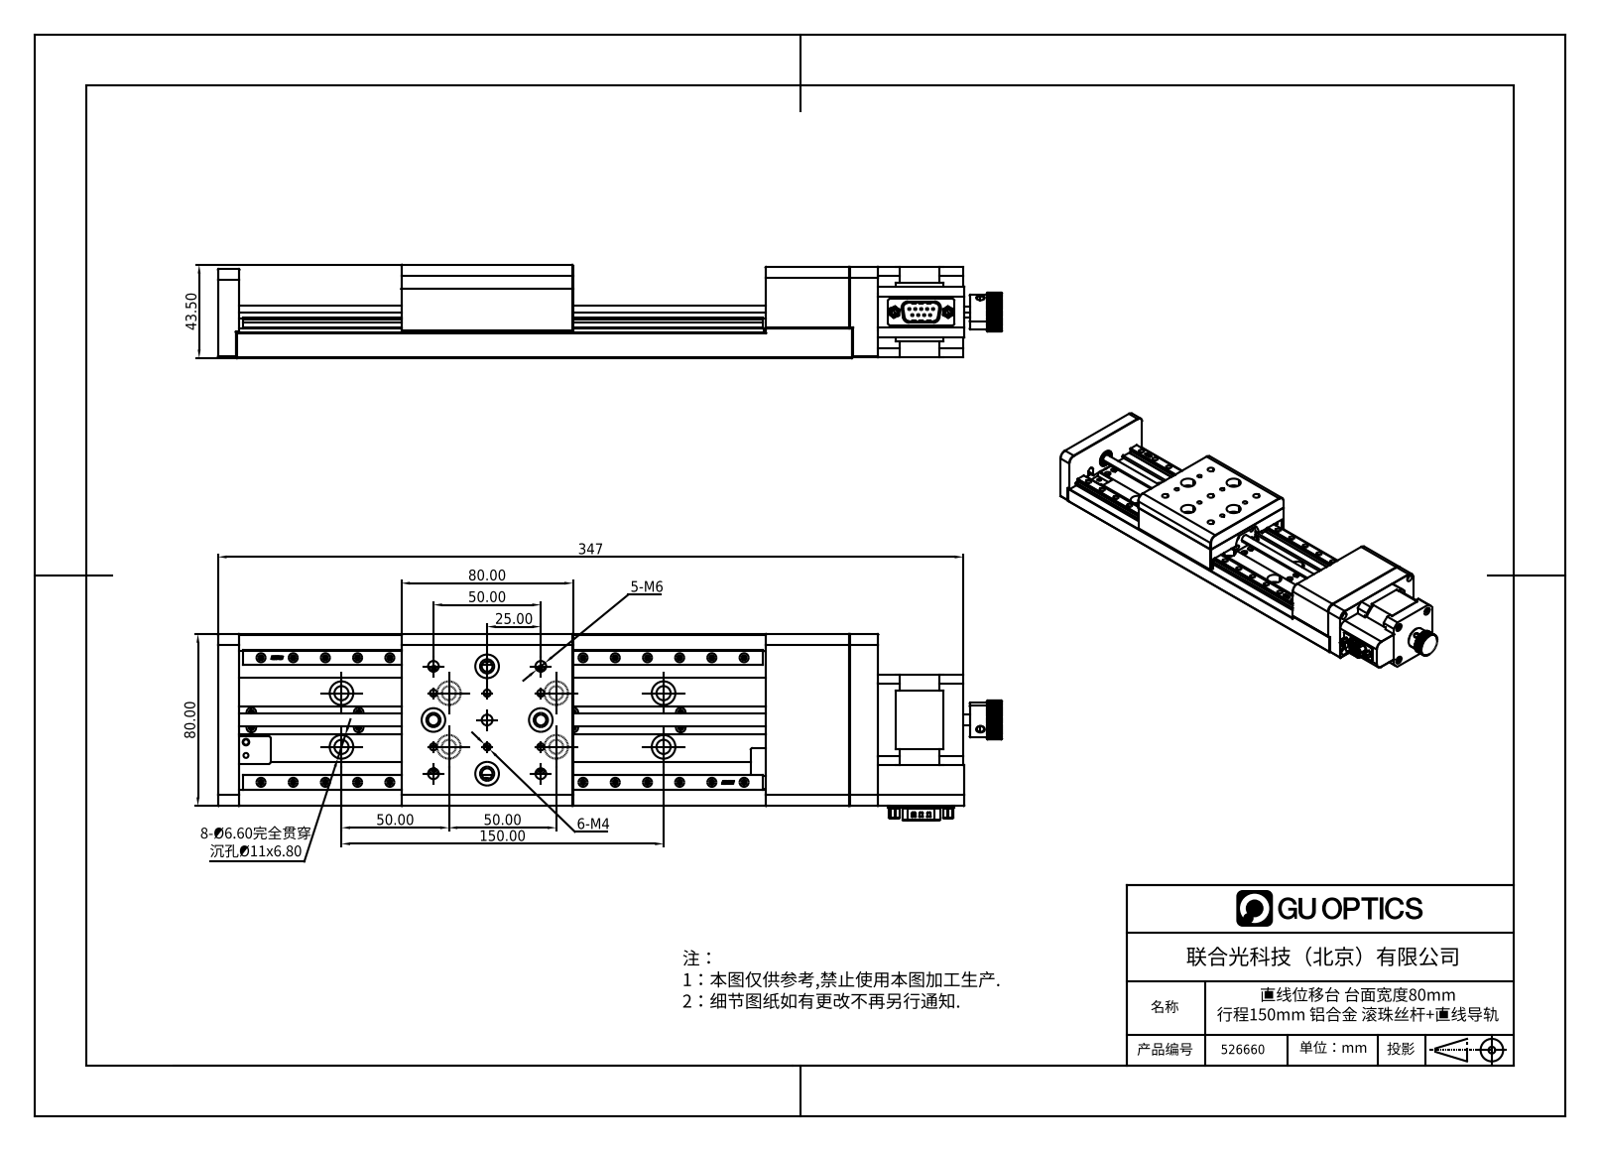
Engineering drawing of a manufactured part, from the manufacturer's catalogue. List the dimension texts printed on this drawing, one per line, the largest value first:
347
150.00
80.00
80.00
50.00
50.00
50.00
43.50
25.00
8-Ø6.60完全贯穿 沉孔Ø11x6.80
5-M6
6-M4
